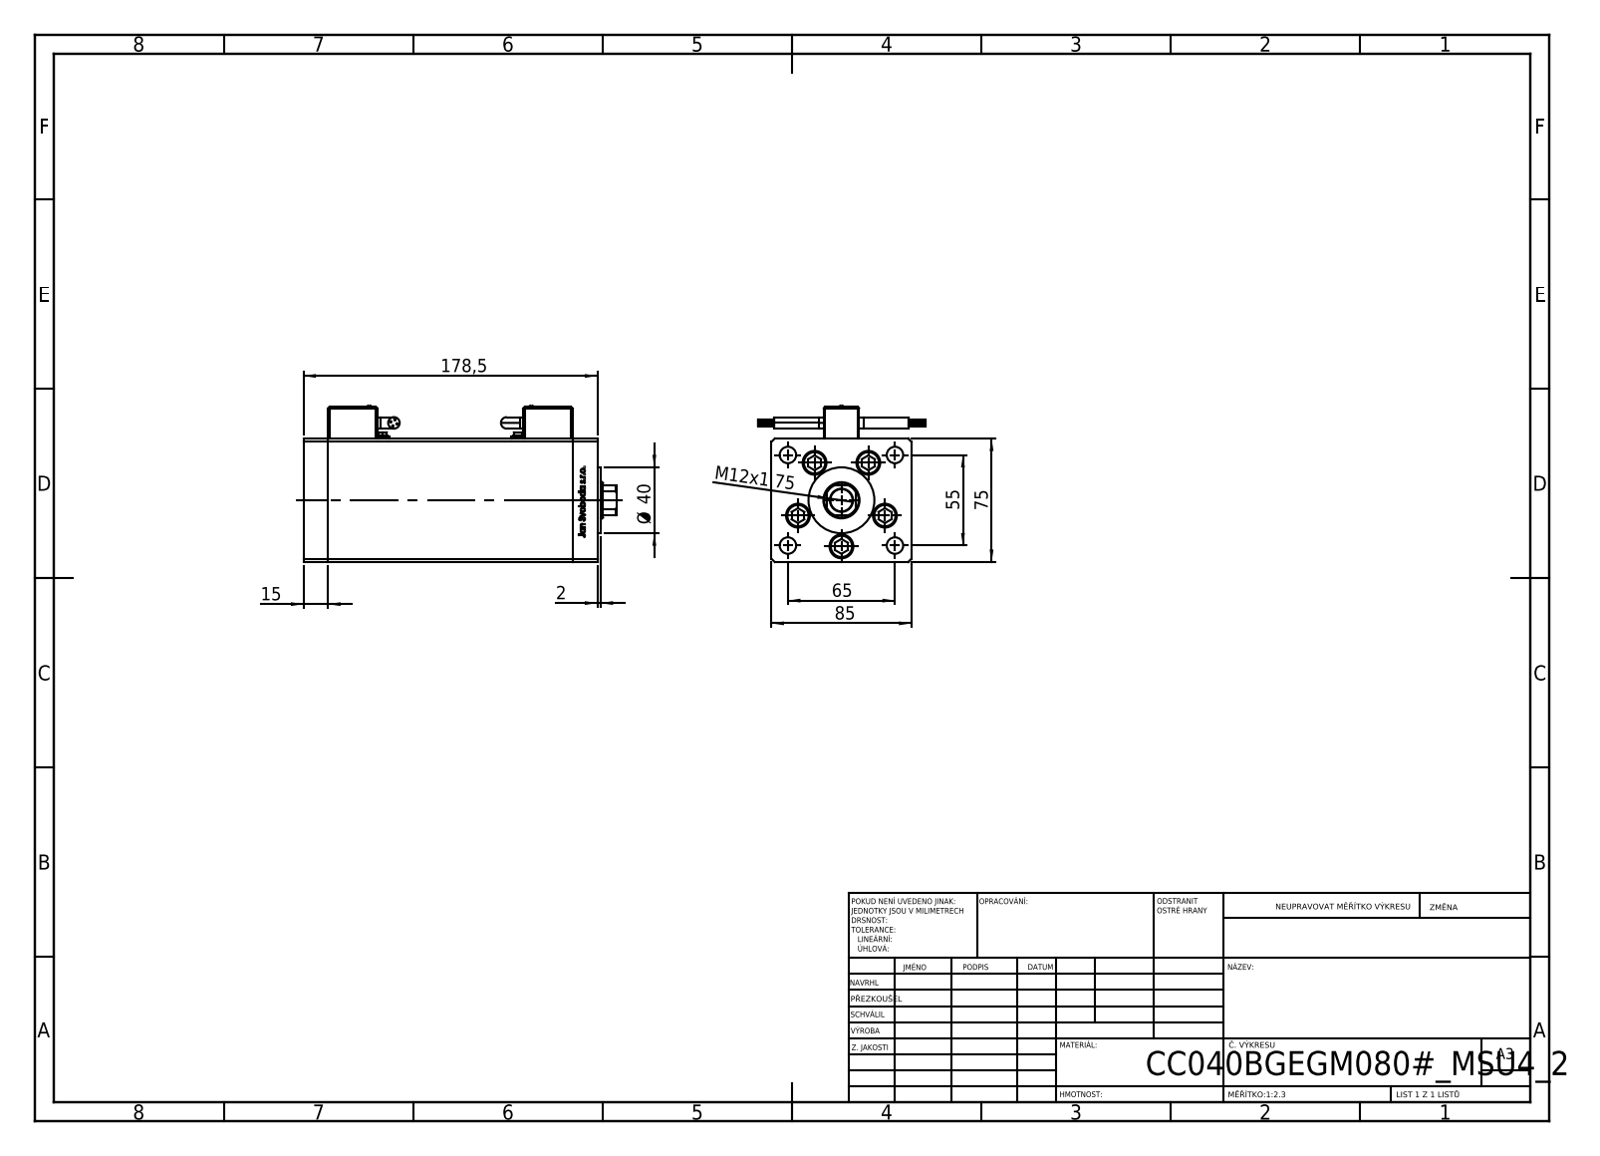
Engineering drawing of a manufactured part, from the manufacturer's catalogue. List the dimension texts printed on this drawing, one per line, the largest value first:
178,5
85
75
65
55
Ø 40
15
M12x1.75
2
